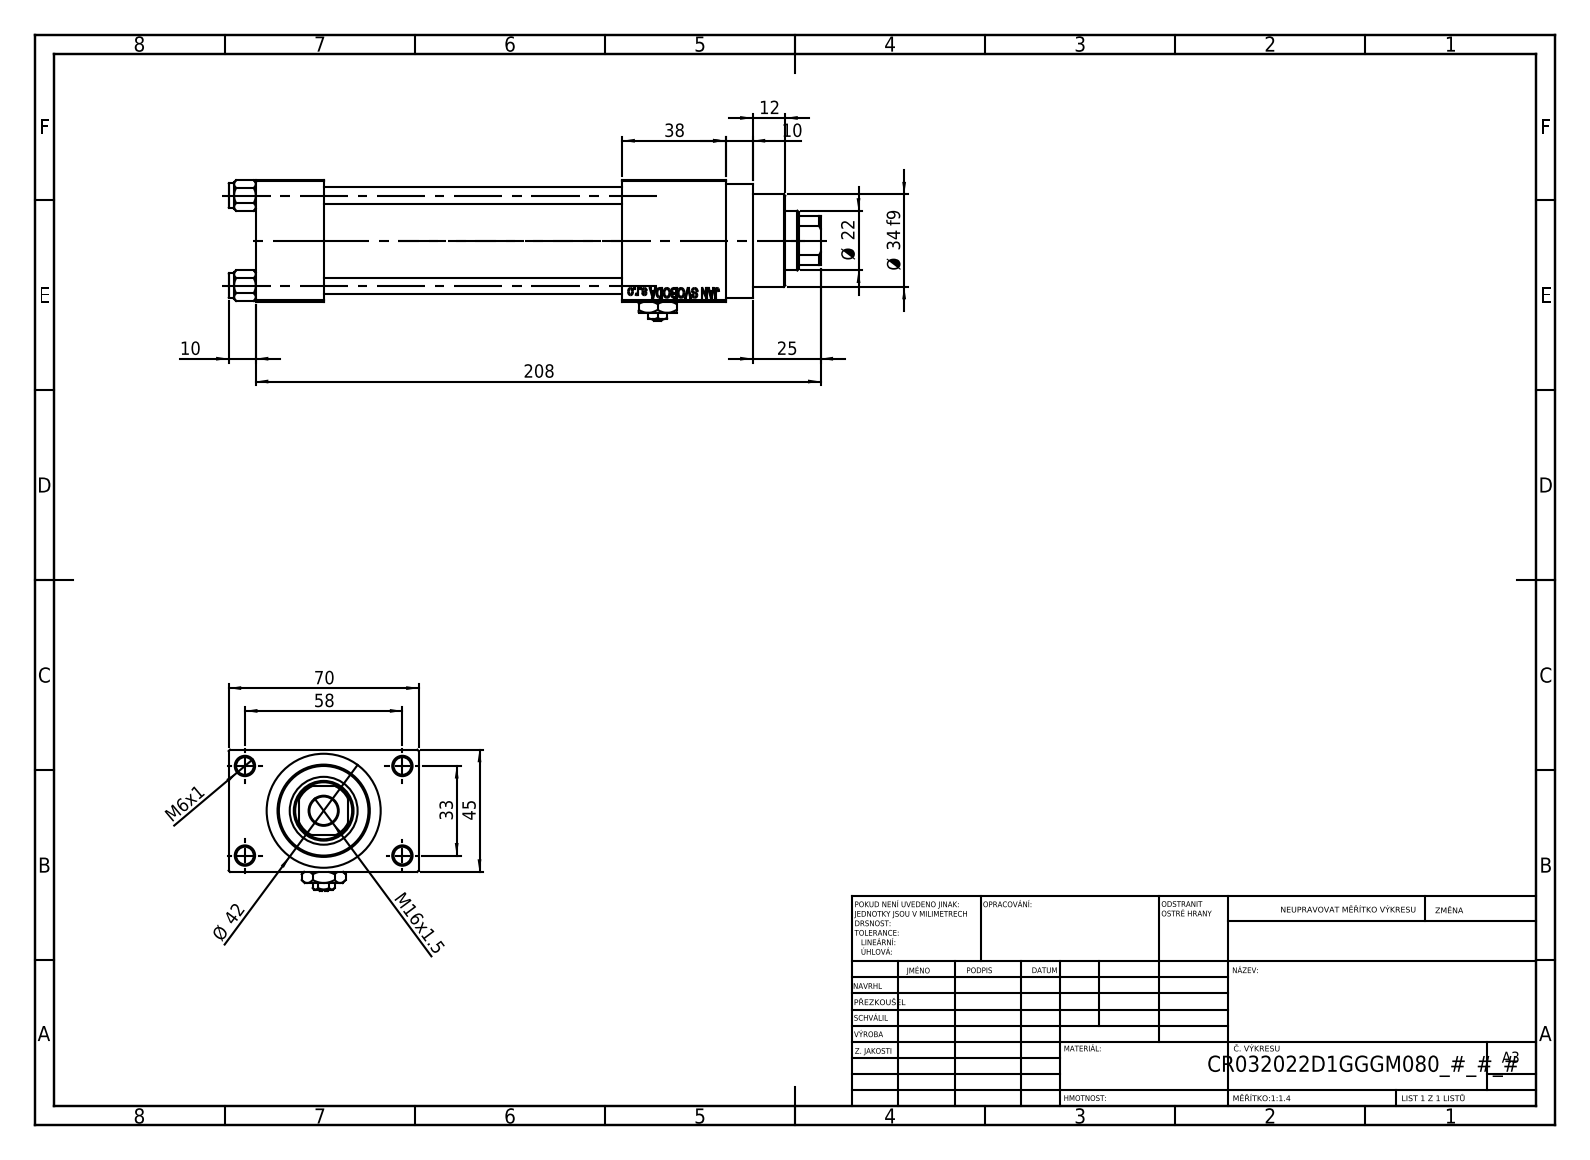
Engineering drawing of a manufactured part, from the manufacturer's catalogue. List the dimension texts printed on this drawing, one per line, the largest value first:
208
70
58
45
Ø 42
38
Ø 34 f9
33
25
Ø 22
M16x1.5
12
10
10
M6x1
